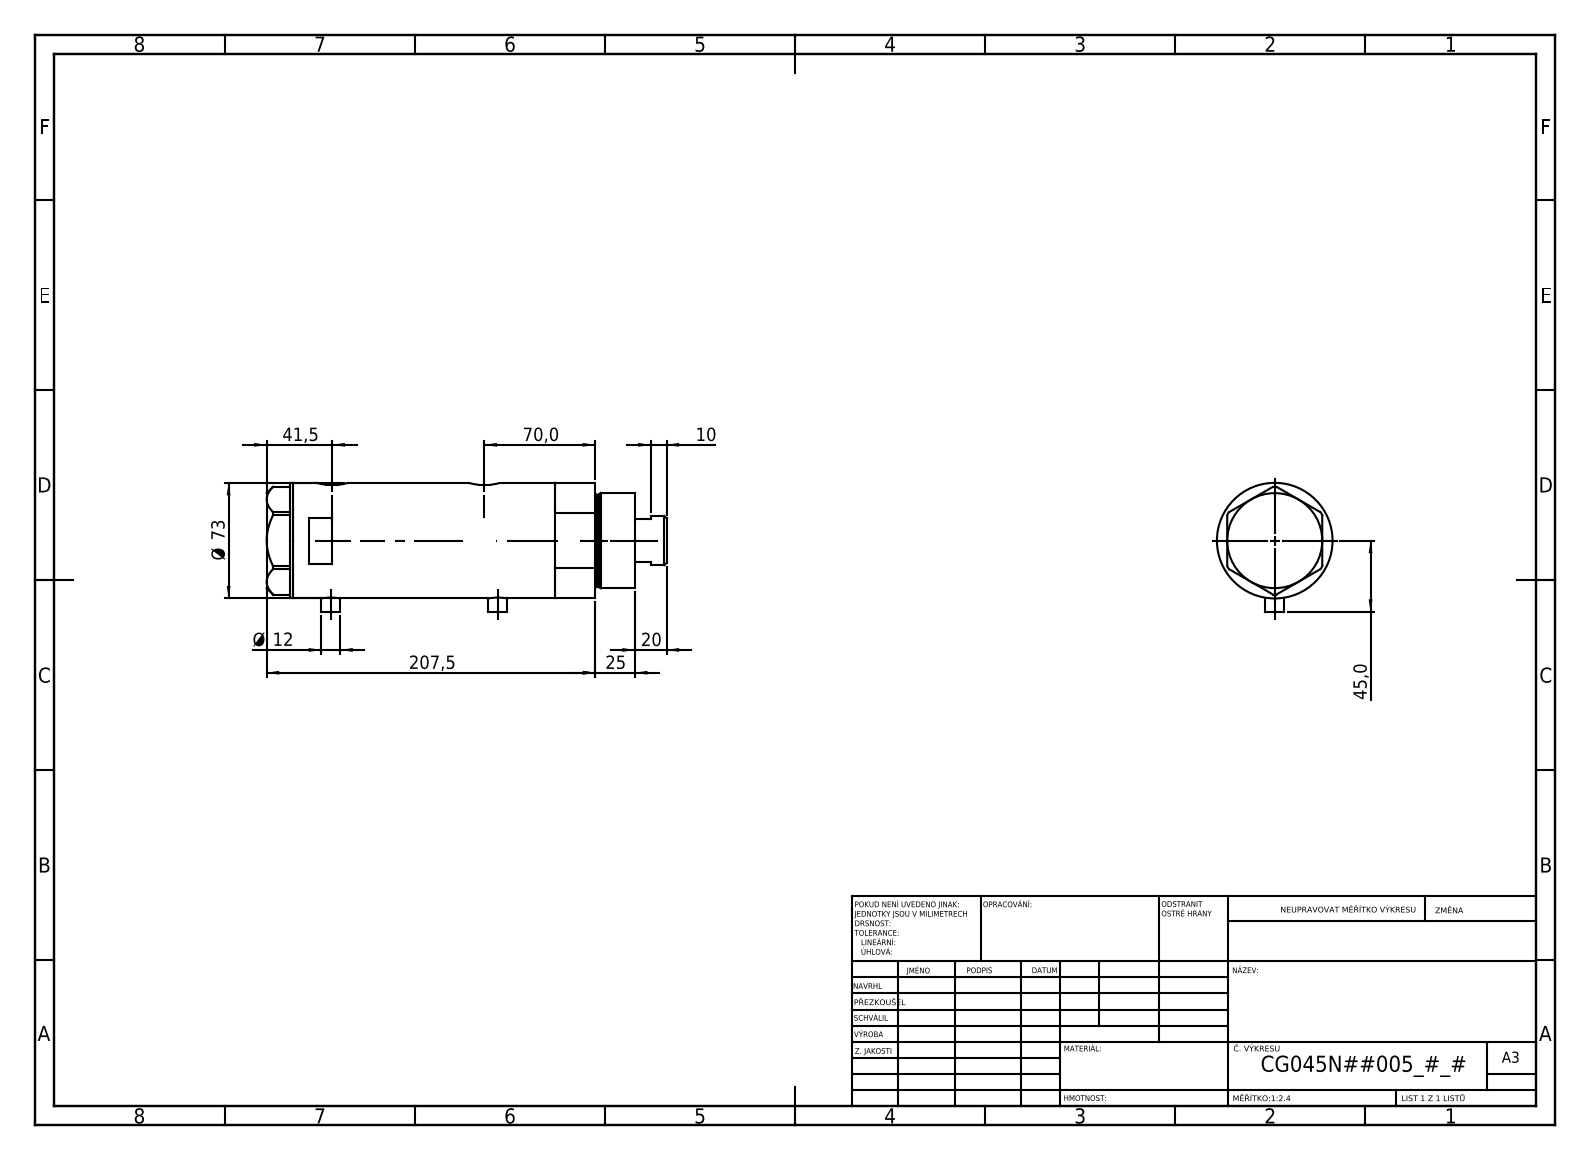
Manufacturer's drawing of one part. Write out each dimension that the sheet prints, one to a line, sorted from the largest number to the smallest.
207,5
Ø 73
70,0
45,0
41,5
25
20
Ø 12
10
